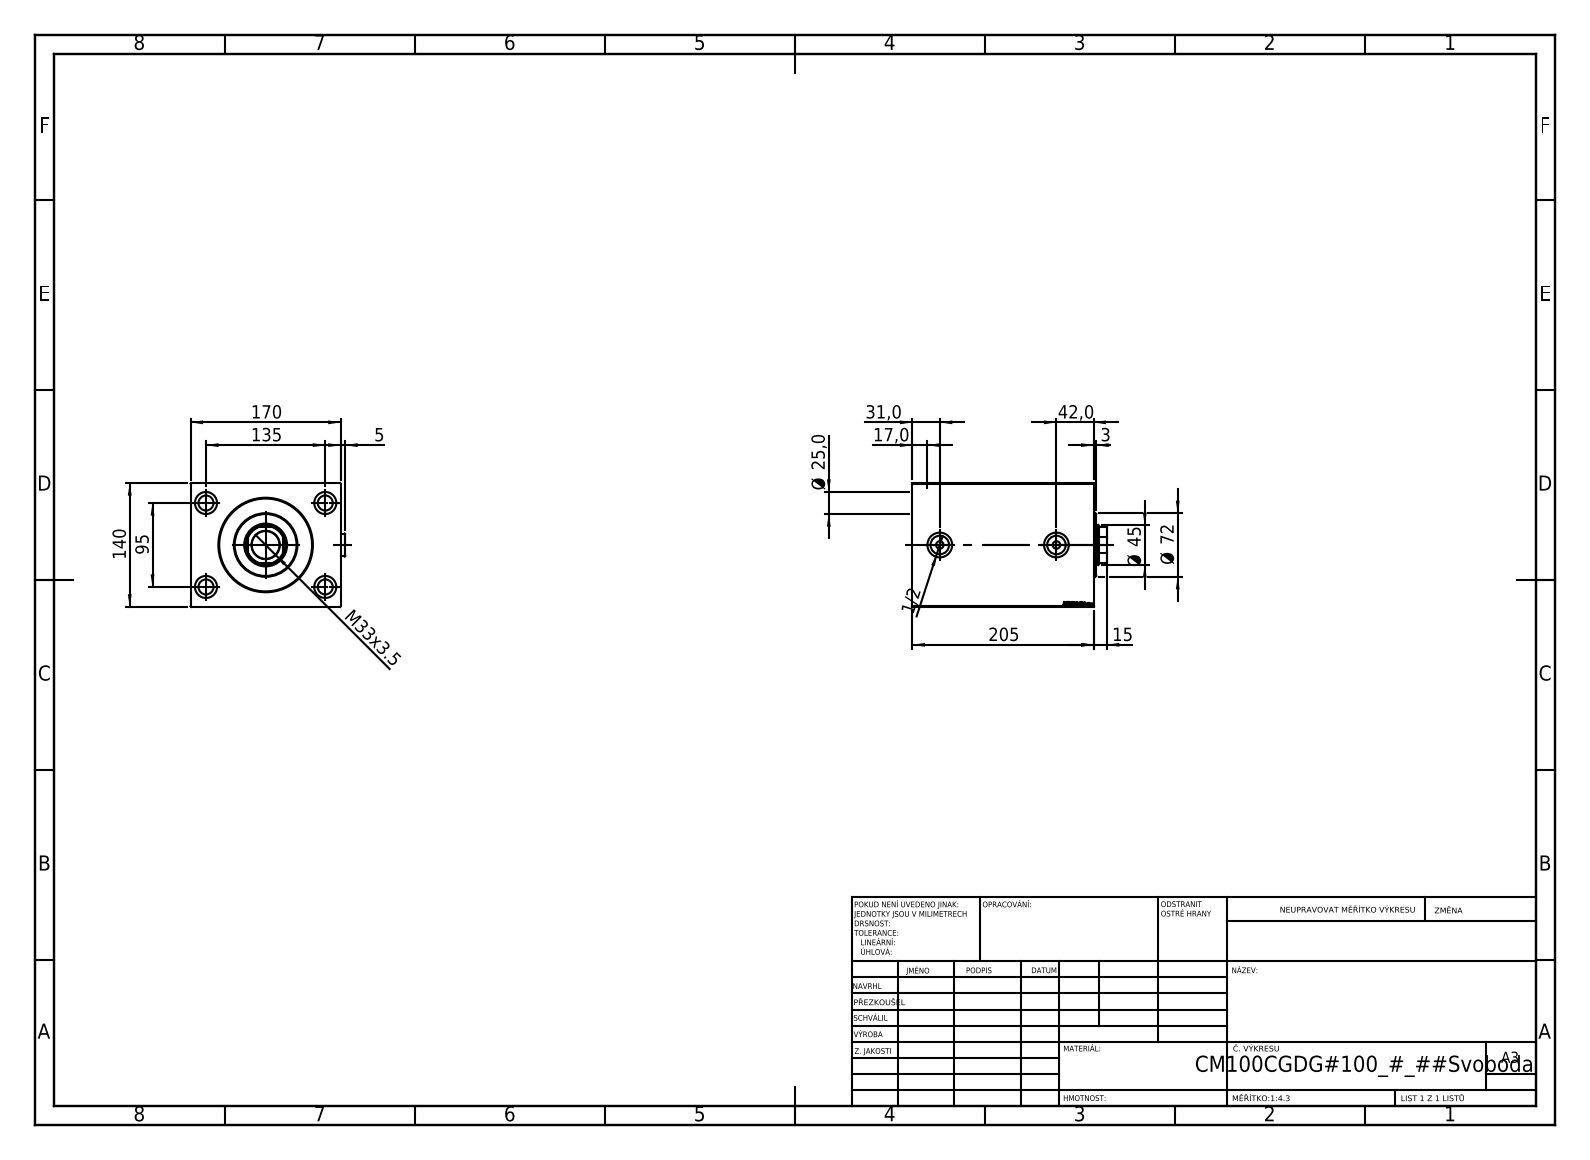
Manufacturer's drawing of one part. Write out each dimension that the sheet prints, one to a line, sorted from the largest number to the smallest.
205
170
140
135
95
Ø 72
Ø 45
42,0
M33x3.5
31,0
Ø 25,0
17,0
15
5
3
1/2
